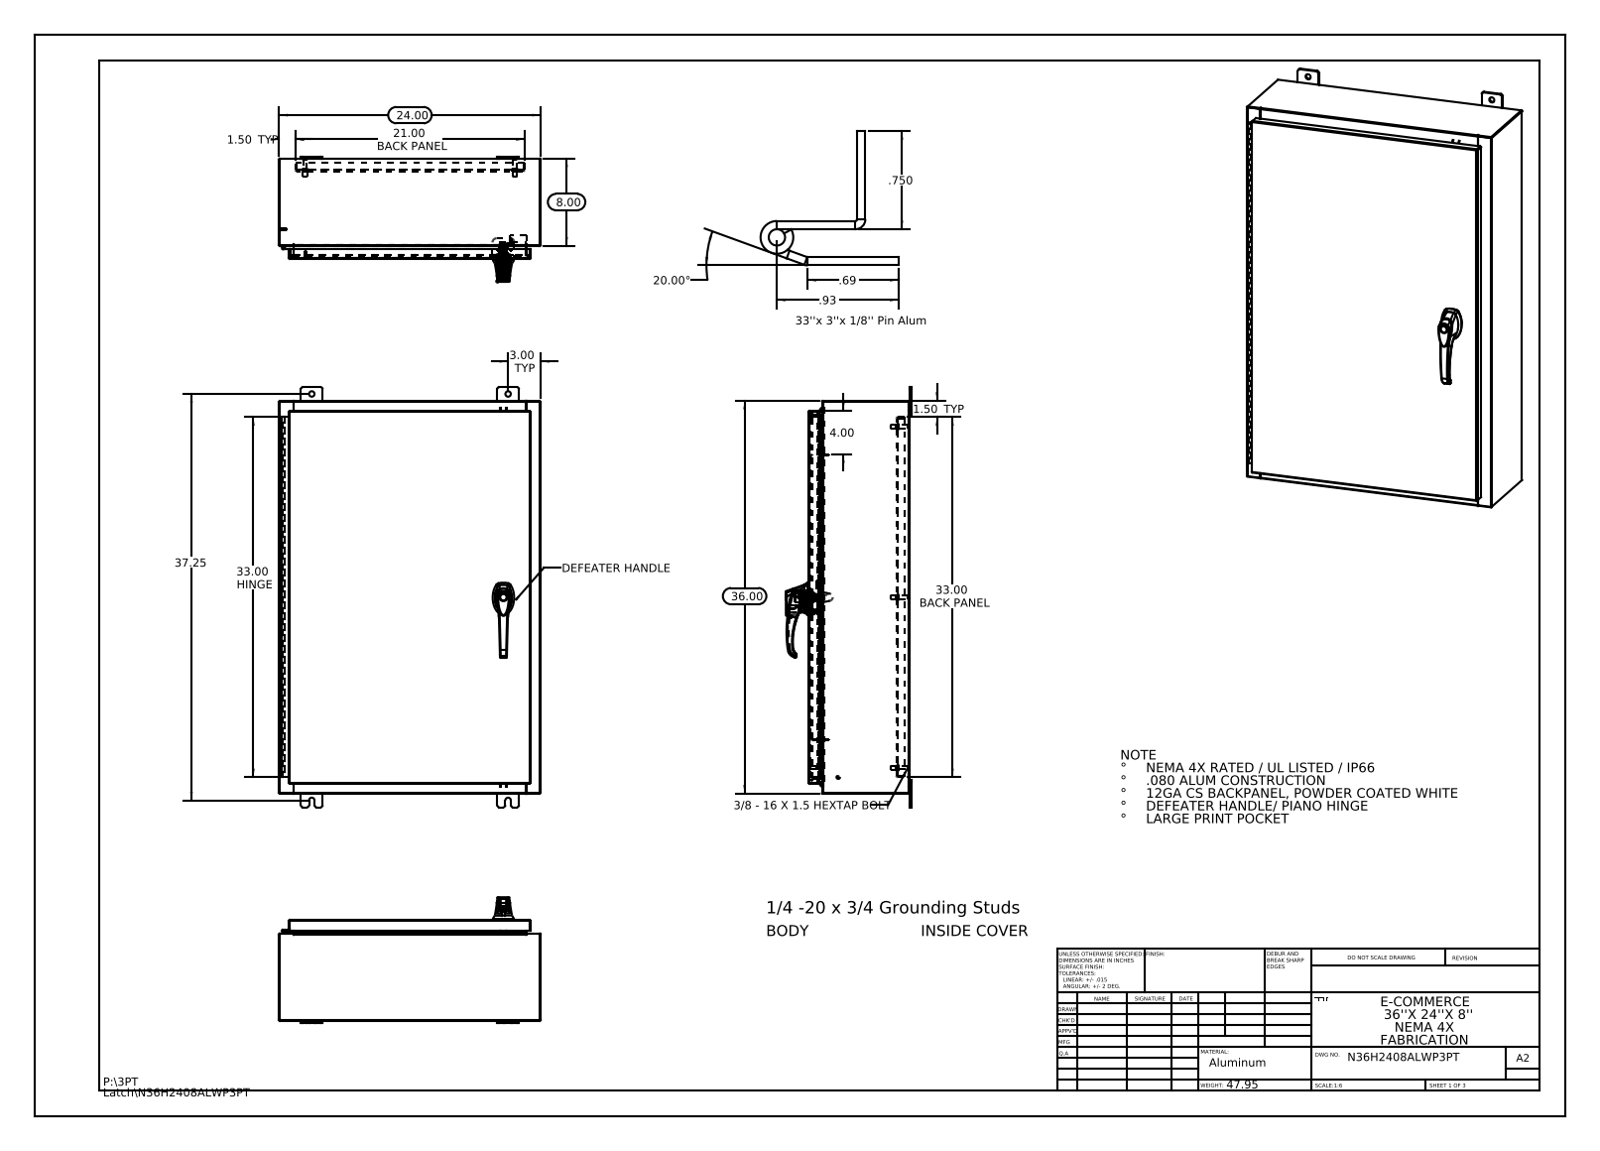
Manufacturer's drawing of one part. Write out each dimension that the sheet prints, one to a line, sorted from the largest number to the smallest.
37.25
36.00
33.00 HINGE
33.00 BACK PANEL
24.00
21.00 BACK PANEL
20.00°
8.00
4.00
3.00 TYP
1.50 TYP
1.50 TYP
.93
.750
.69
